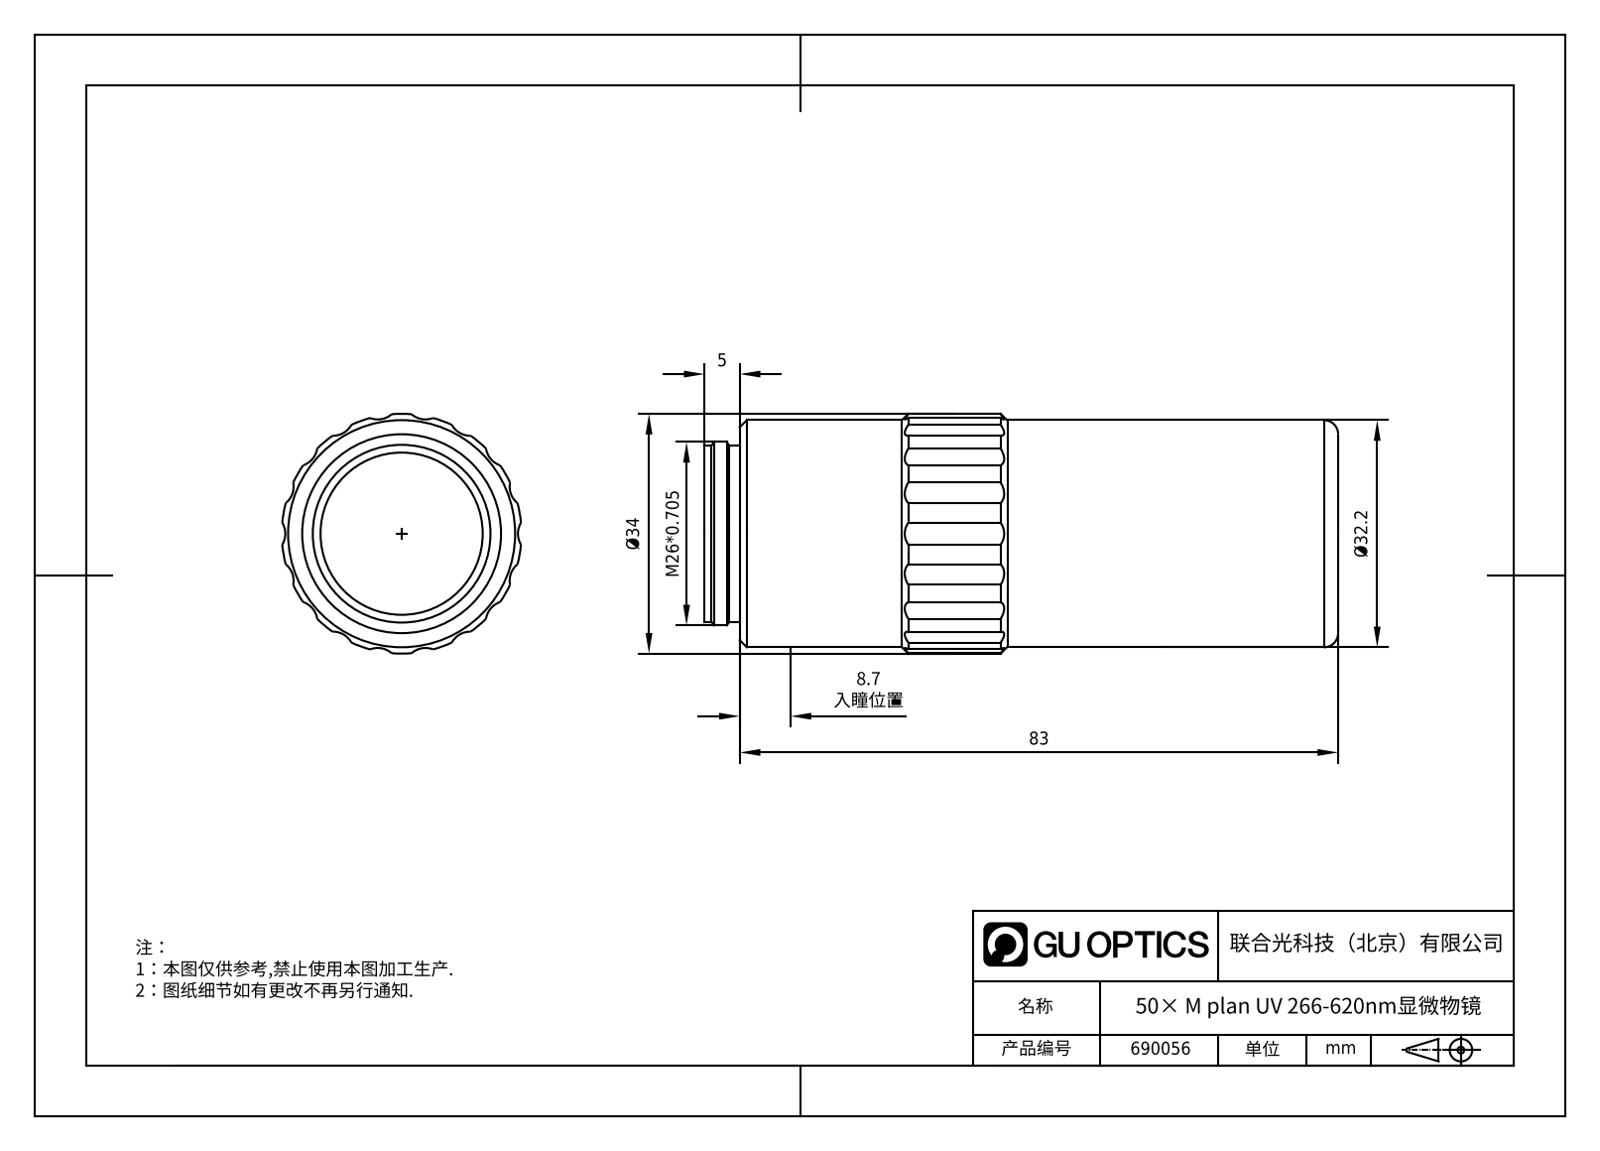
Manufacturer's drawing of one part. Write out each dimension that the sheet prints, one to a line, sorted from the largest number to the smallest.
83
Ø34
Ø32.2
M26*0.705
8.7 入瞳位置
5
